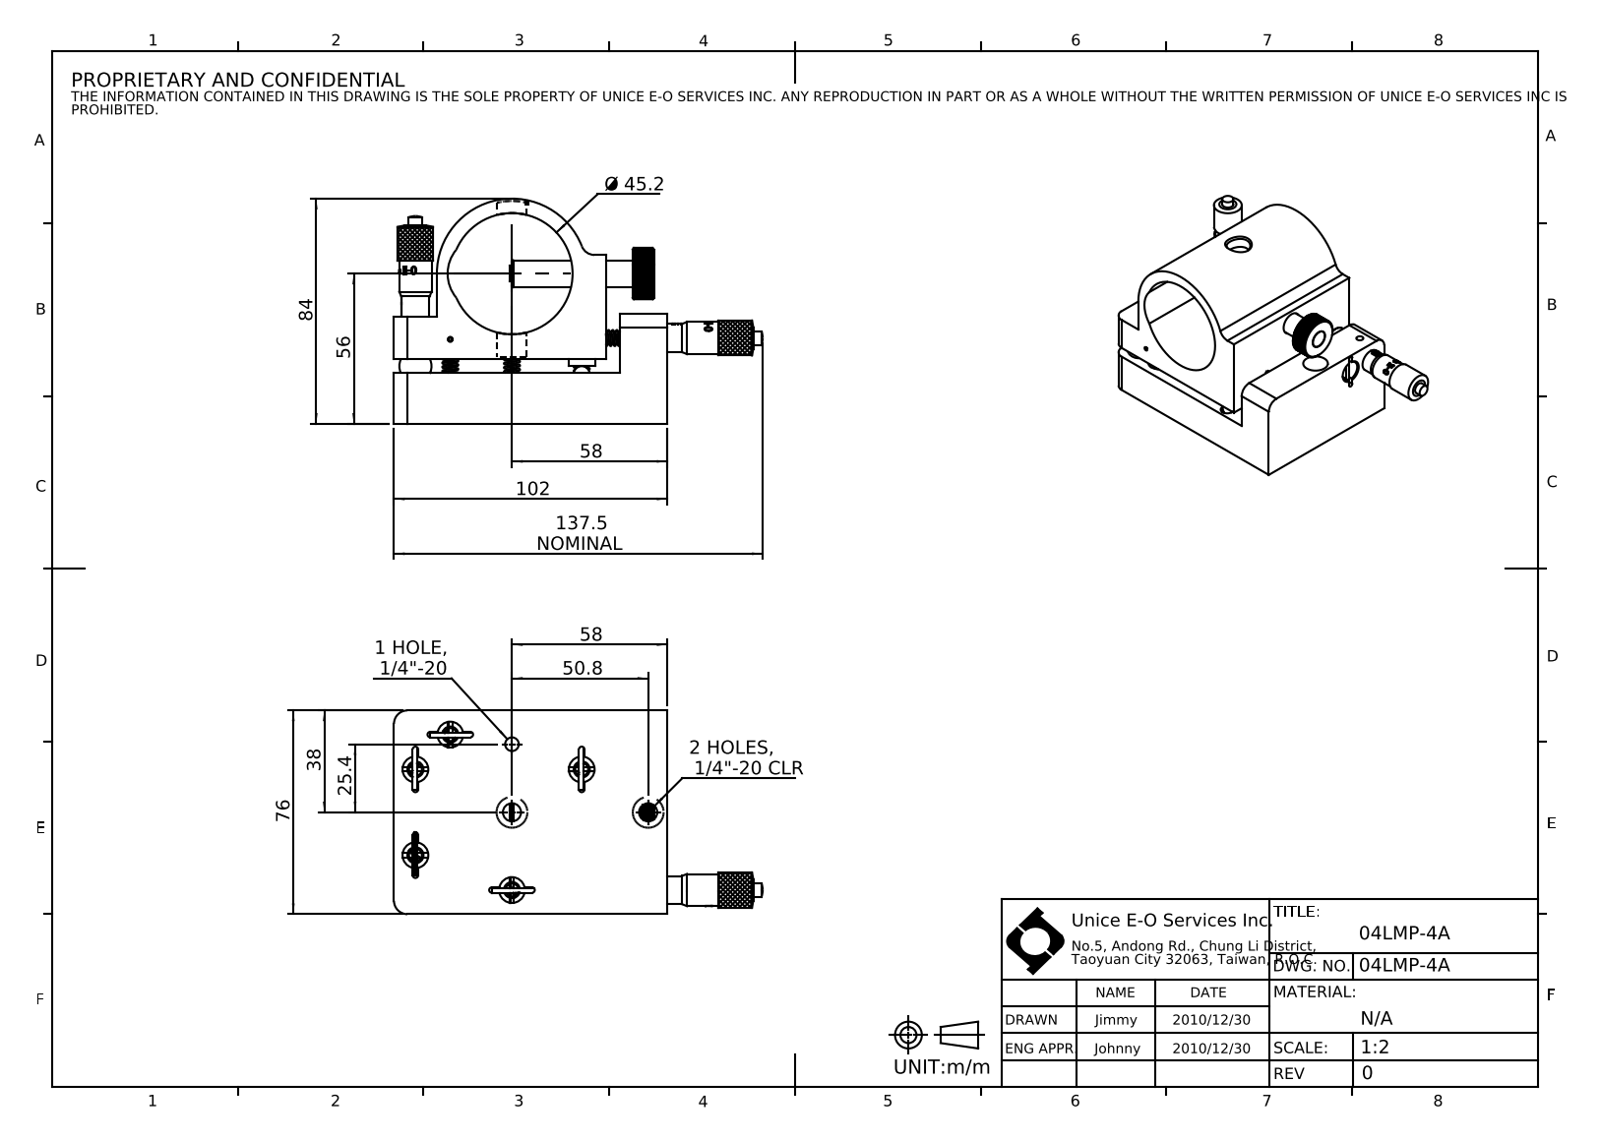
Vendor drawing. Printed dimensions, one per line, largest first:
137.5 NOMINAL
102
84
76
58
58
56
50.8
Ø 45.2
38
25.4
2 HOLES, 1/4"-20 CLR
1 HOLE, 1/4"-20
